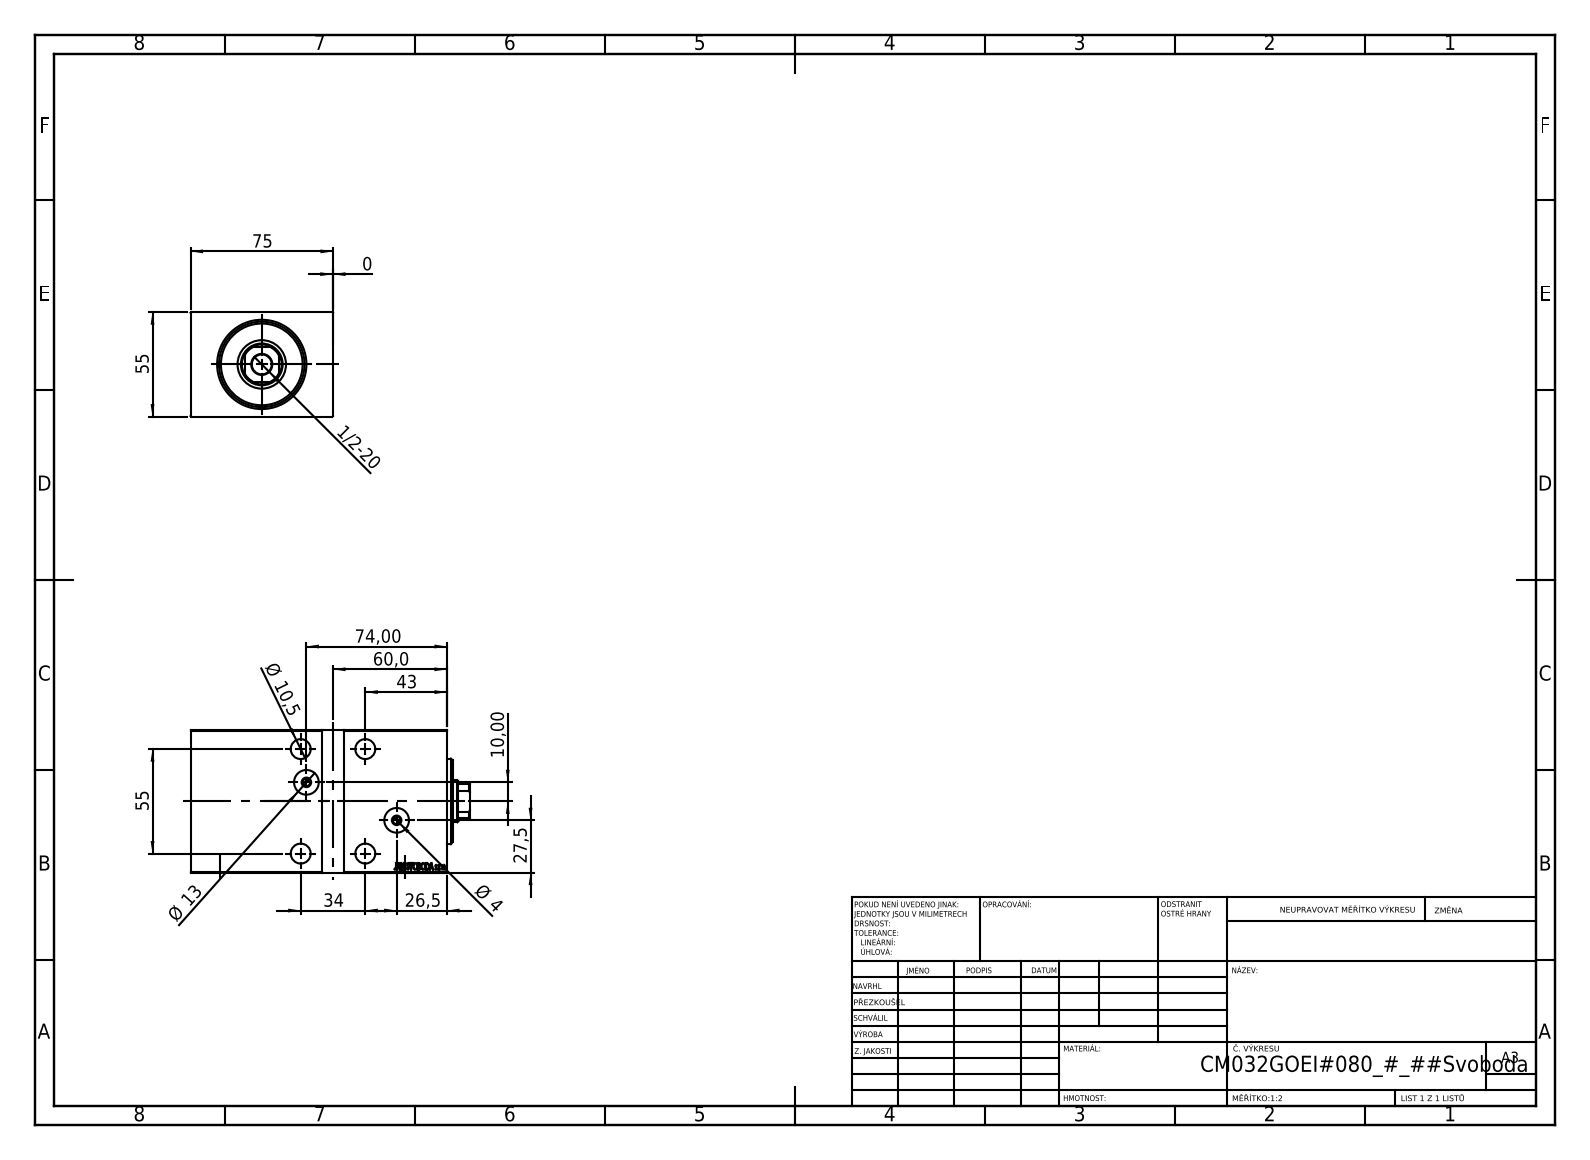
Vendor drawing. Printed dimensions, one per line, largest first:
75
74,00
60,0
55
55
43
34
27,5
26,5
Ø 13
Ø 10,5
10,00
Ø 4
1/2-20
0
